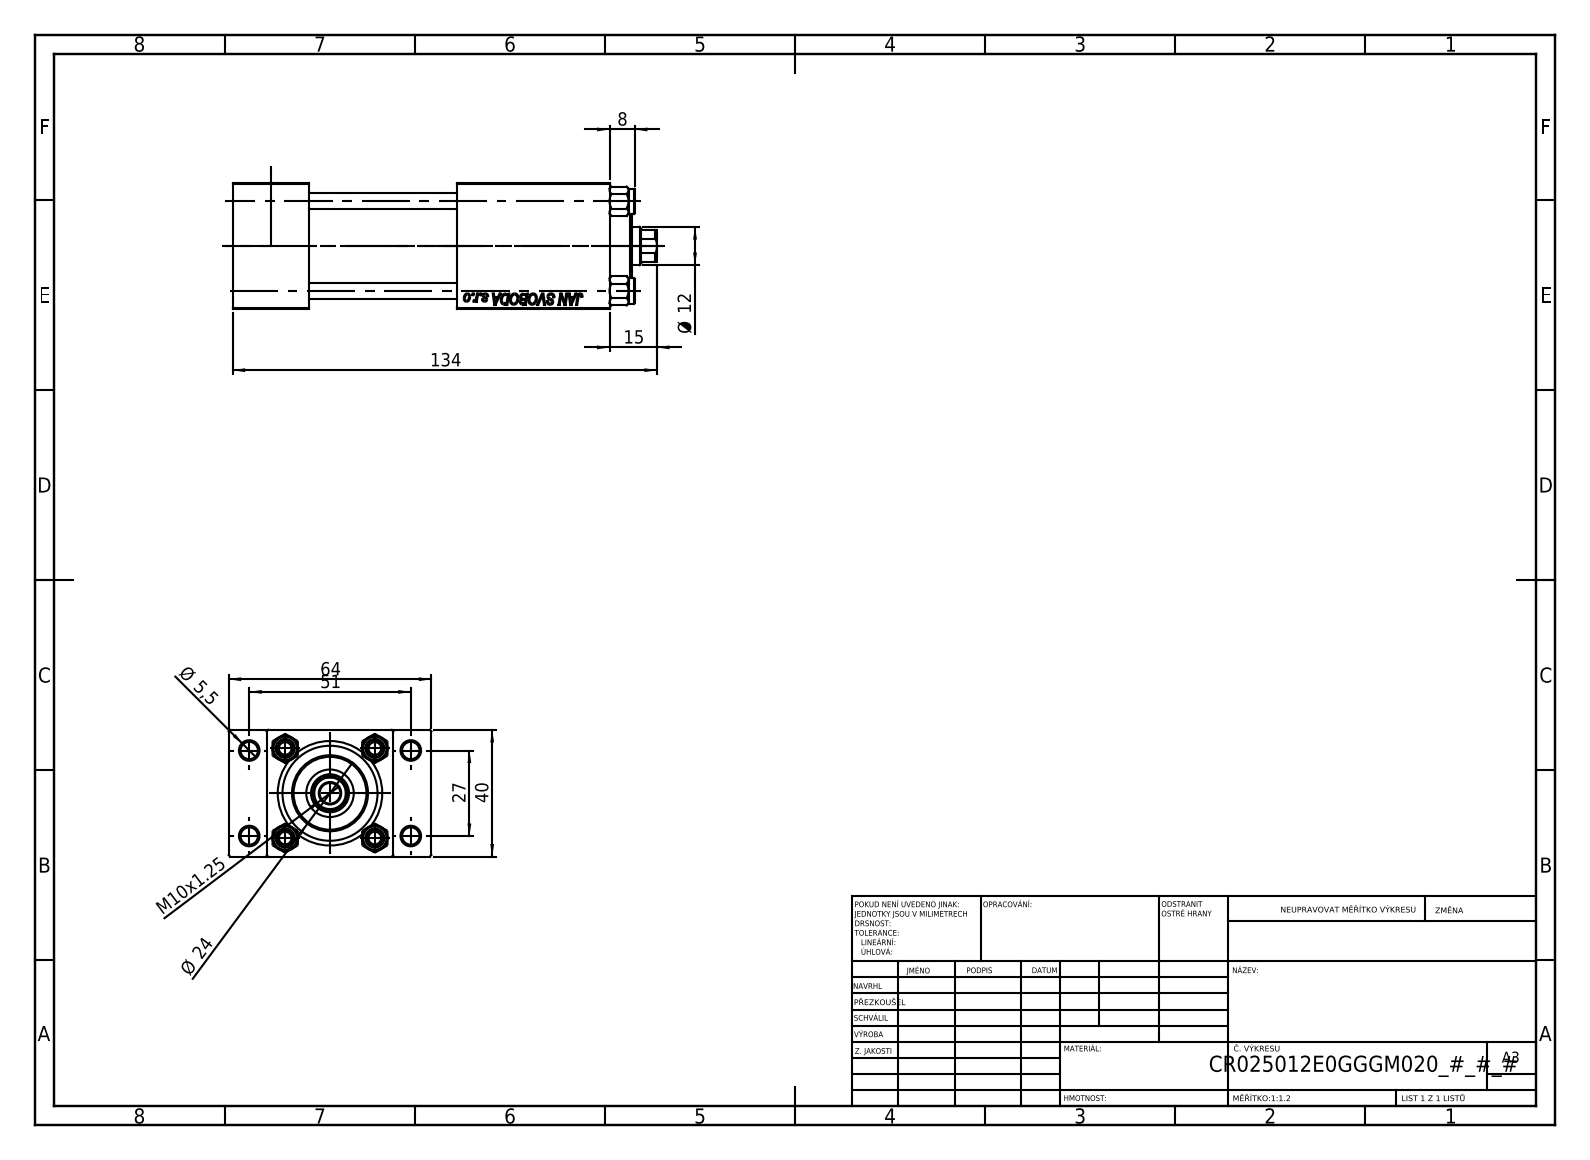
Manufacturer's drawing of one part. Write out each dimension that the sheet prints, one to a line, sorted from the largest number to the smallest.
134
64
51
40
27
Ø 24
15
Ø 12
M10x1.25
8
Ø 5,5
